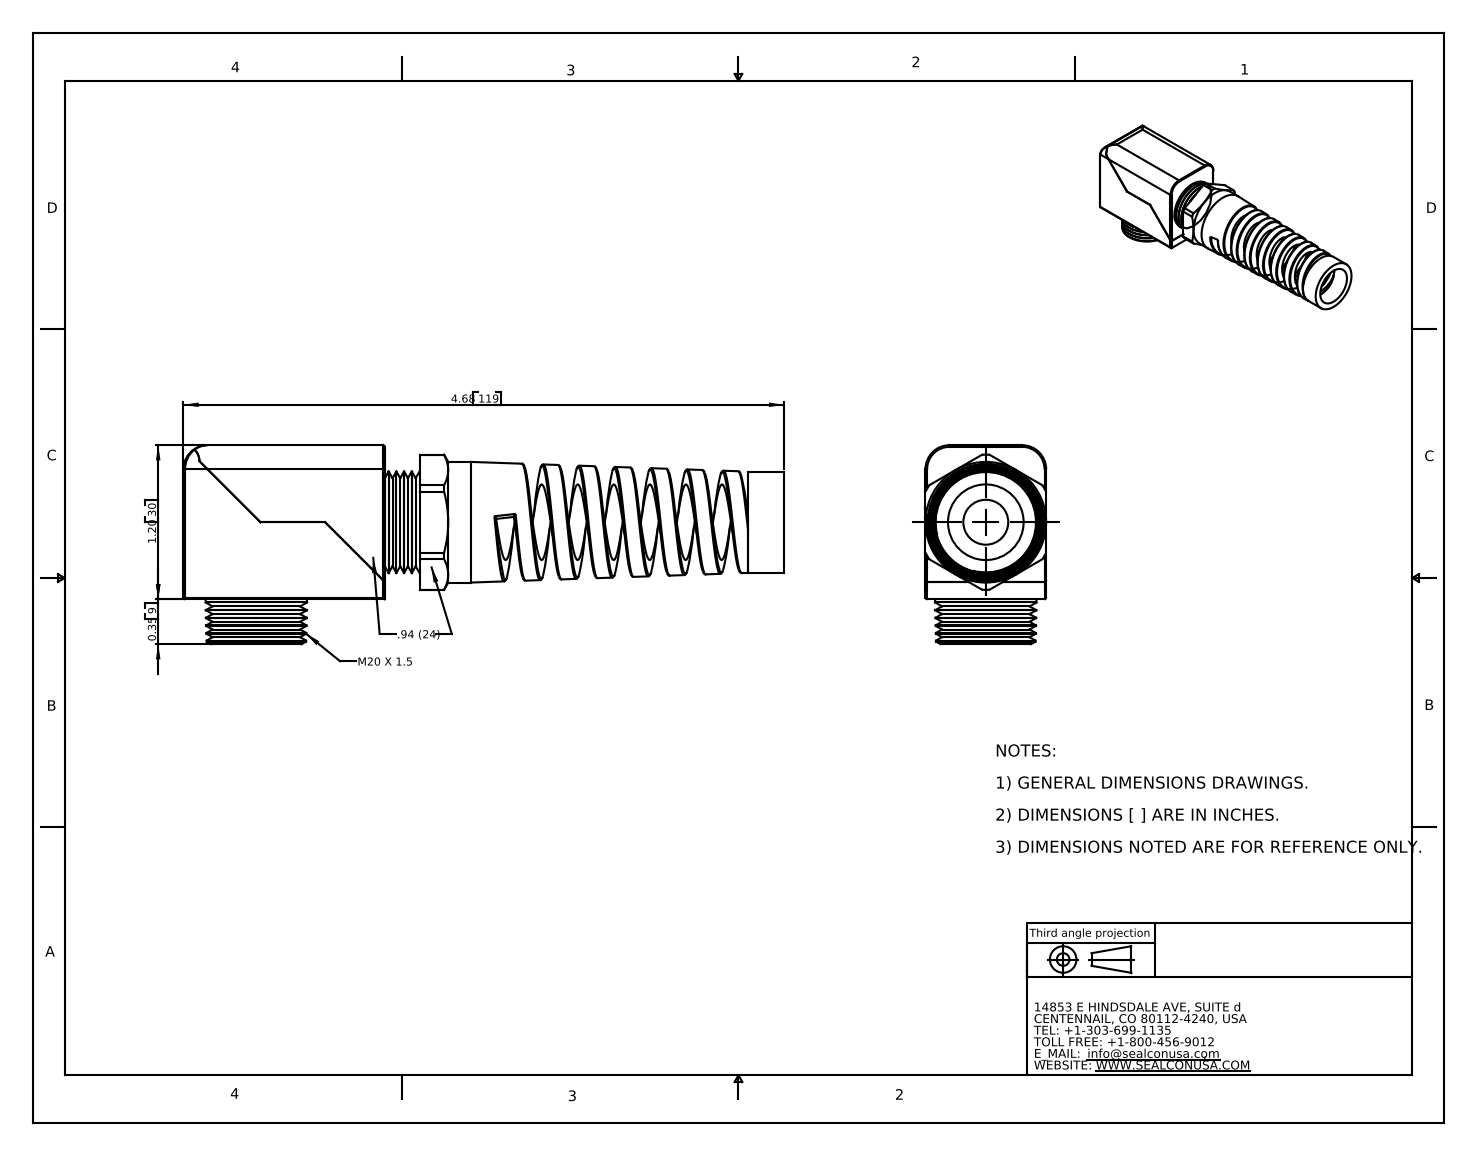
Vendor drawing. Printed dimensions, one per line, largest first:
4.68 119
1.20 30
0.35 9
